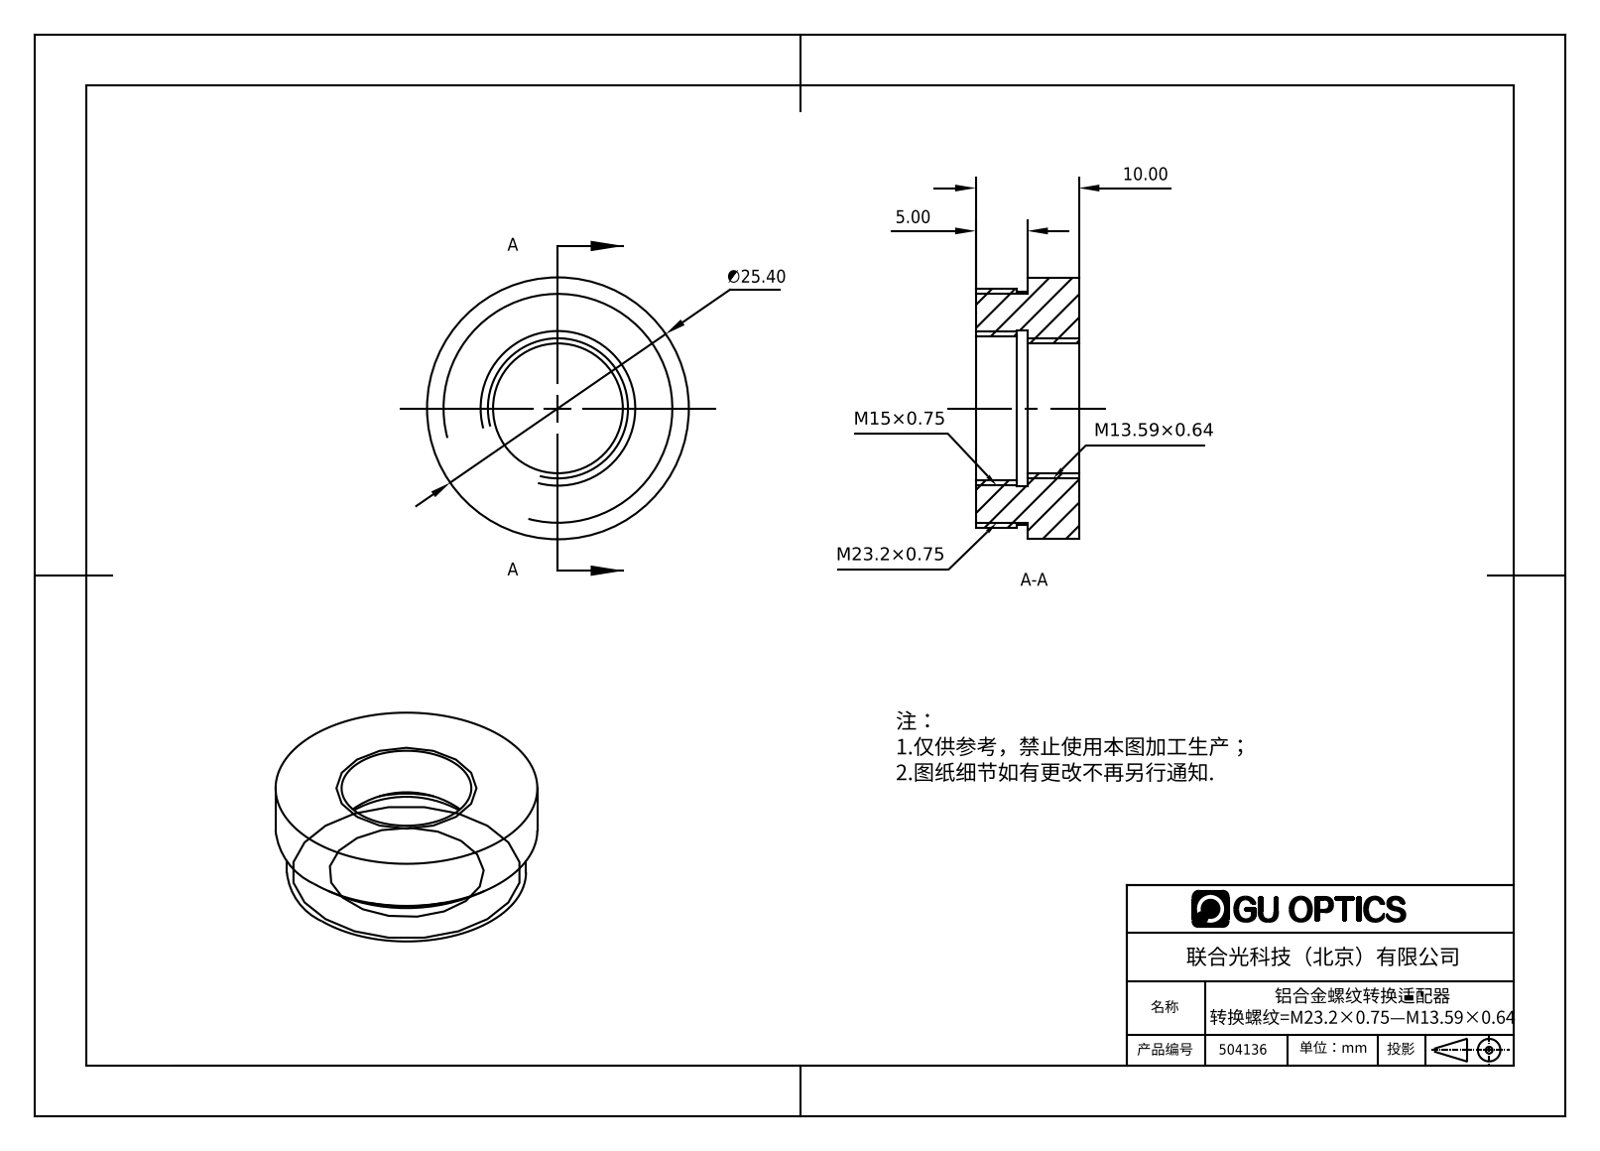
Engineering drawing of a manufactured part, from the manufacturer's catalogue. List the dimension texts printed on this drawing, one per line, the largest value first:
∅25.40
10.00
5.00
